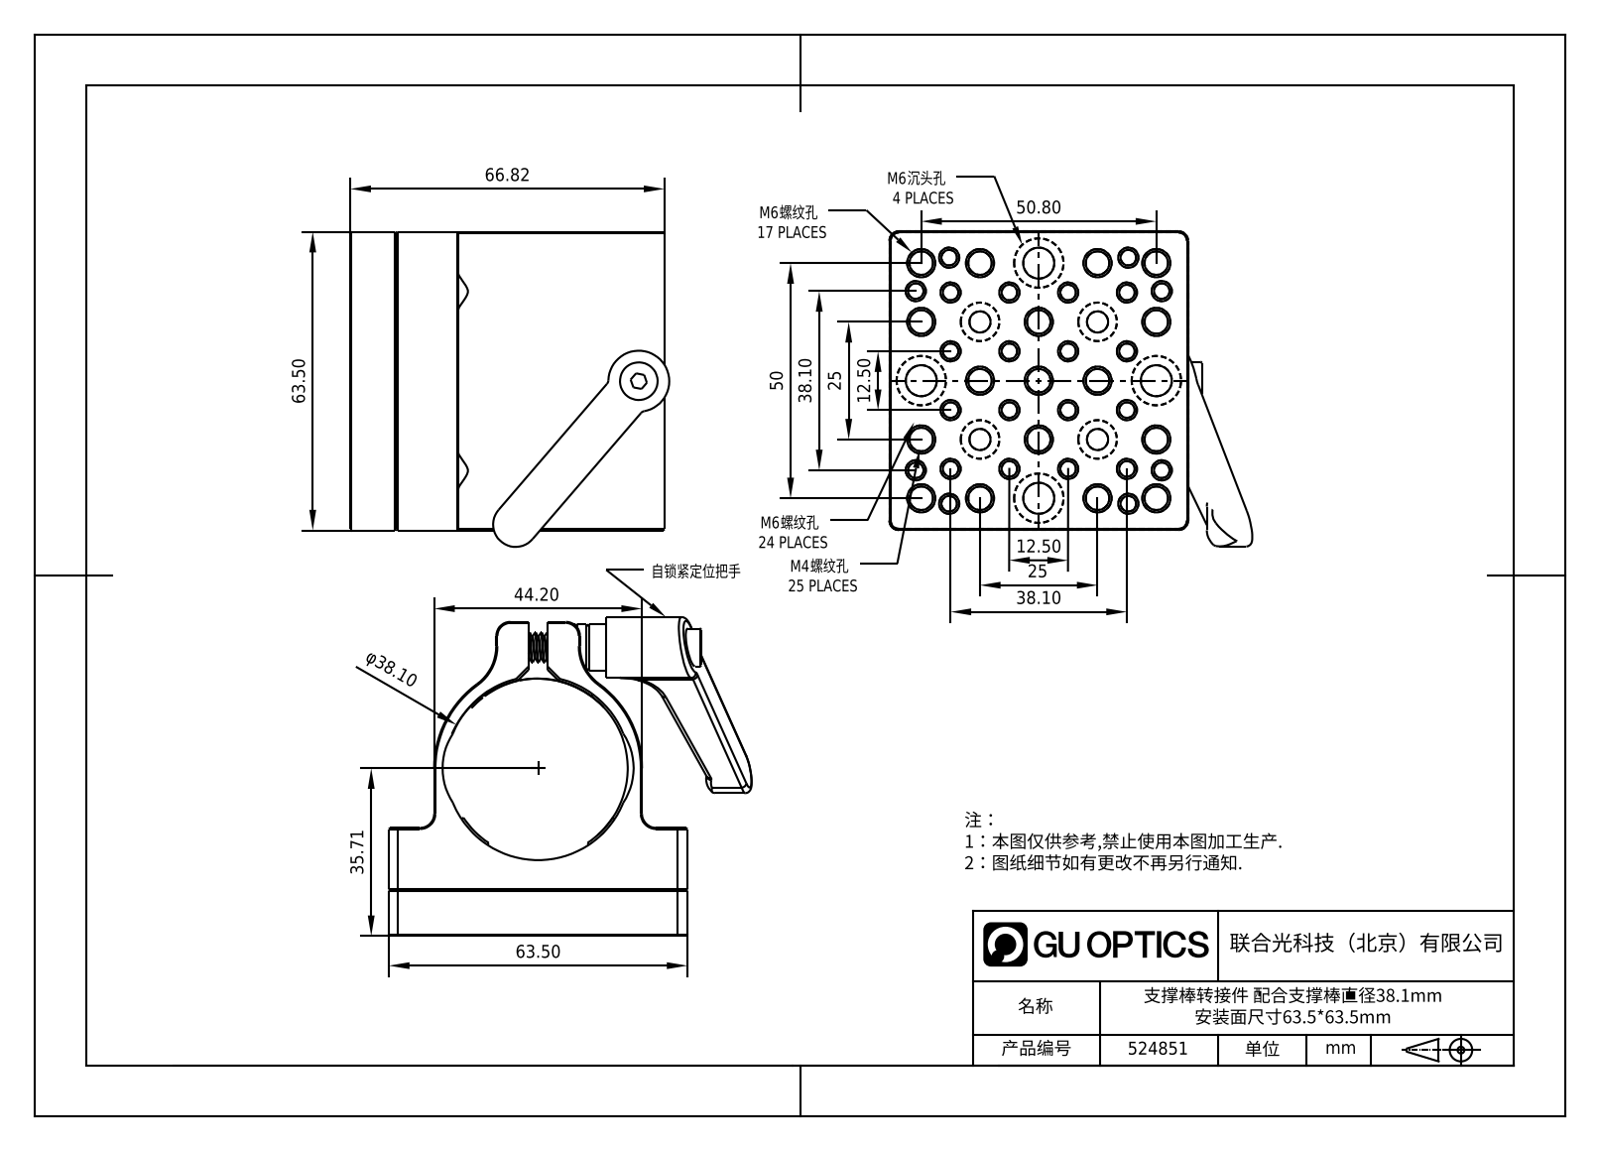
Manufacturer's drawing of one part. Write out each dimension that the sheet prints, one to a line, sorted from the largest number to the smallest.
66.82
63.50
63.50
50.80
50
44.20
38.10
38.10
φ38.10
35.71
25
25
12.50
12.50
